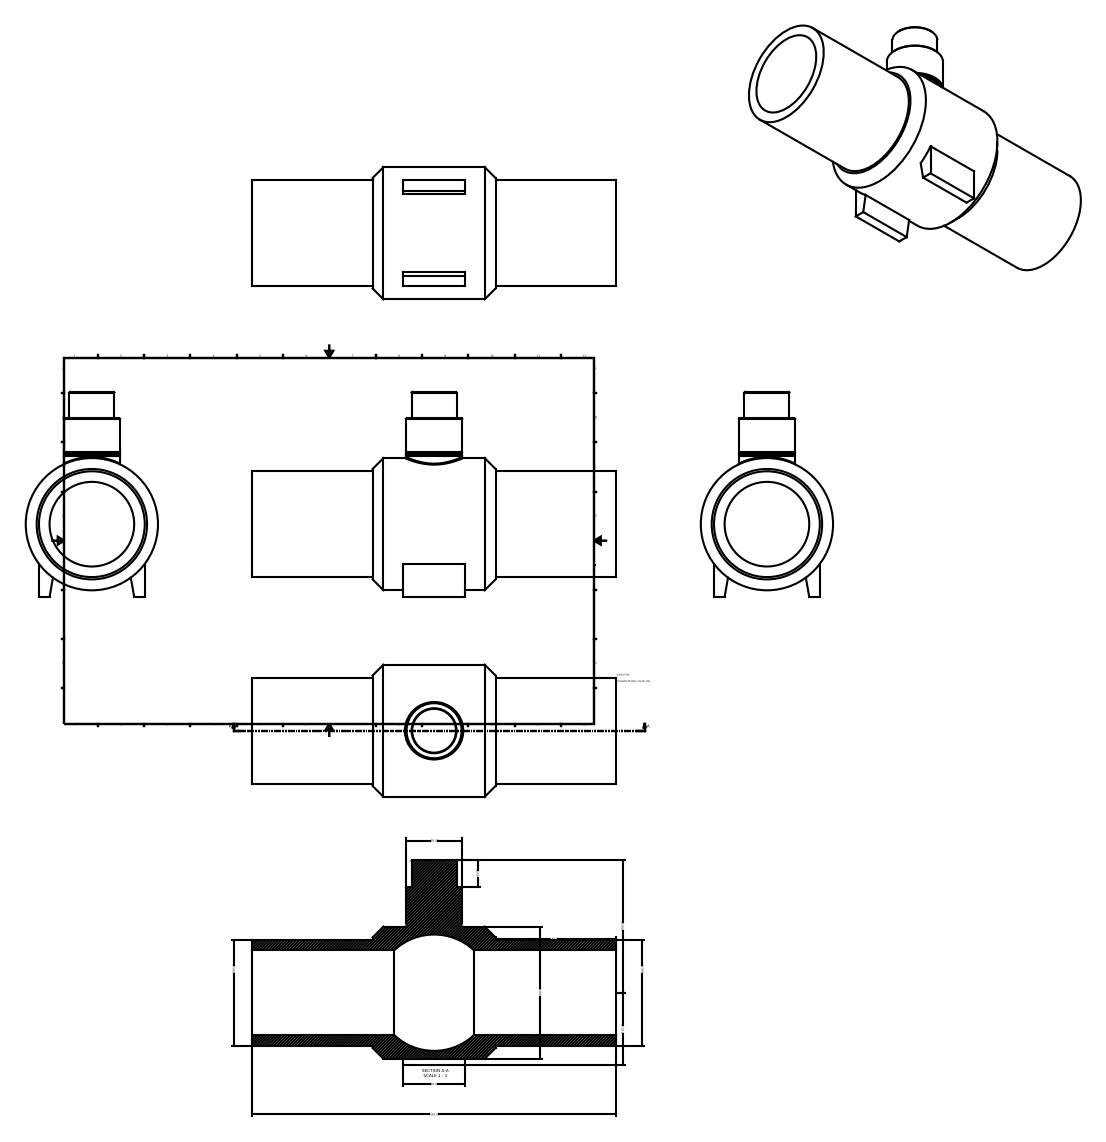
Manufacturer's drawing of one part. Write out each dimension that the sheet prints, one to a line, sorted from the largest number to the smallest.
550.00
200.00
200.00
182.00
160.00
160.00
110.00
93.00
85.00
40.00
